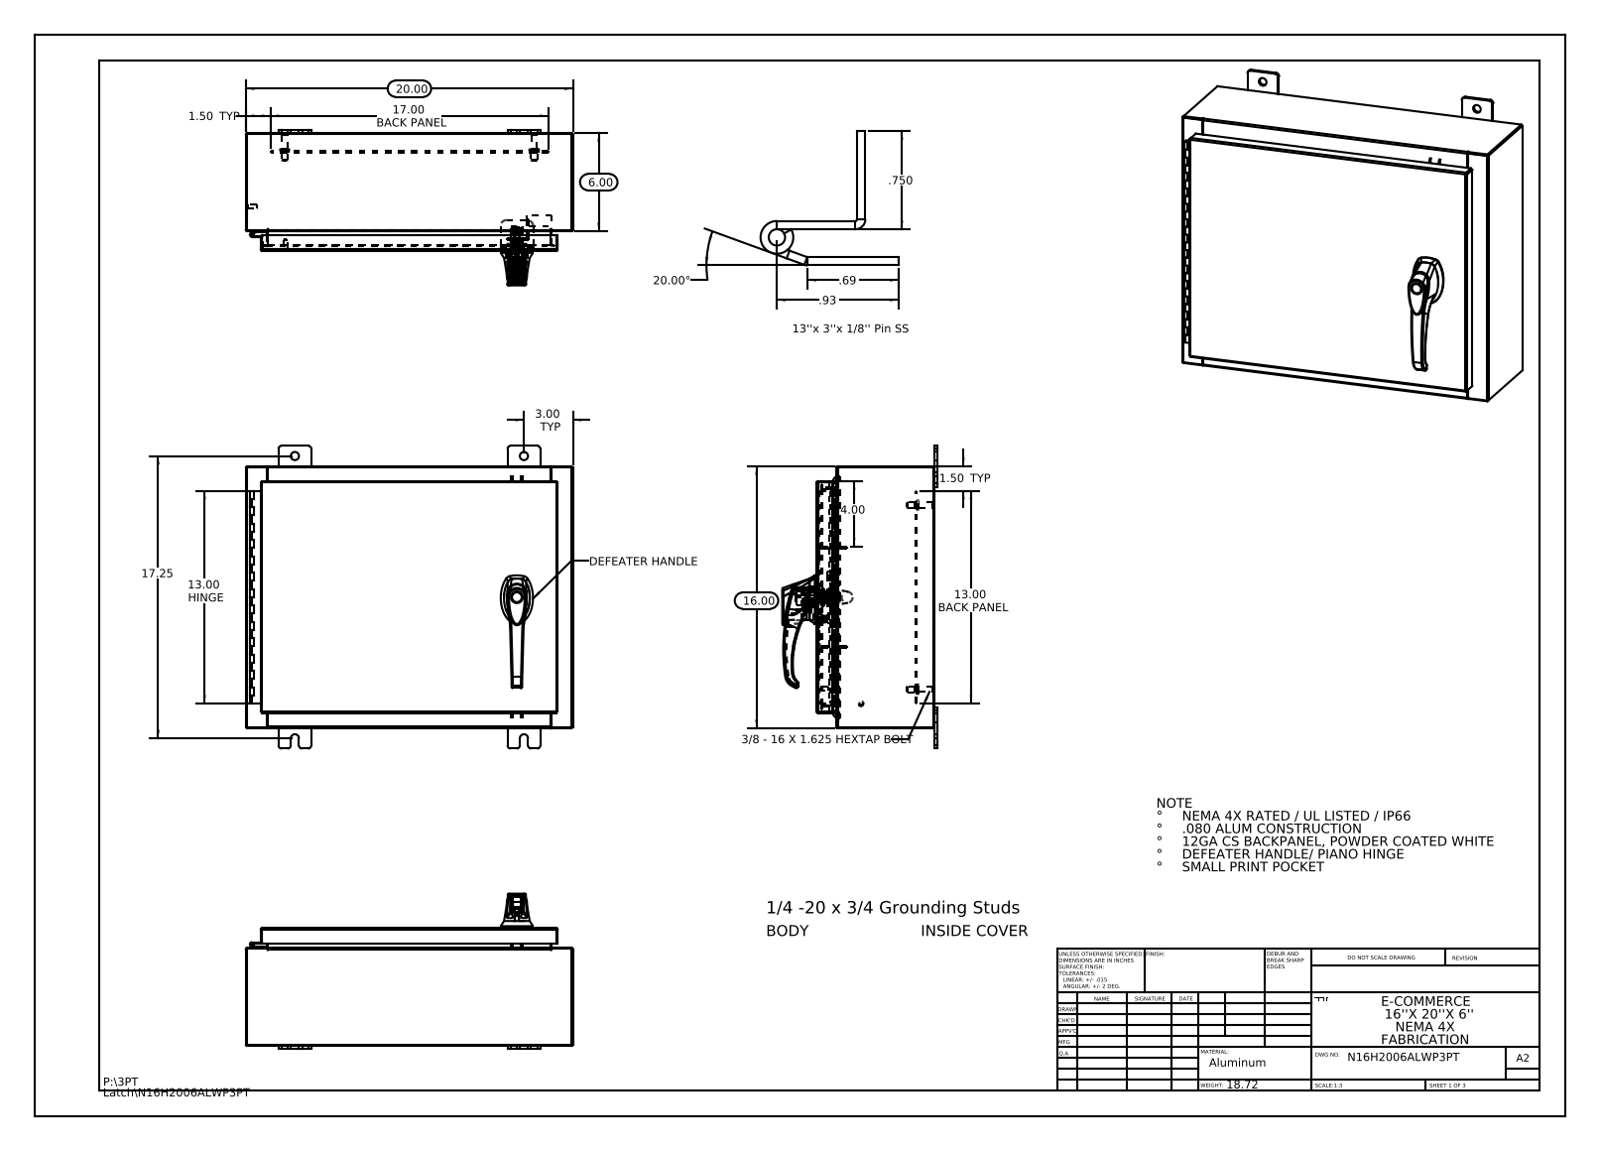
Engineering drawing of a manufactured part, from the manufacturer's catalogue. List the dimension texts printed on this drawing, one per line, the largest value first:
20.00
20.00°
17.25
17.00 BACK PANEL
16.00
13.00 HINGE
13.00 BACK PANEL
6.00
4.00
3.00 TYP
1.50 TYP
1.50 TYP
.93
.750
.69
